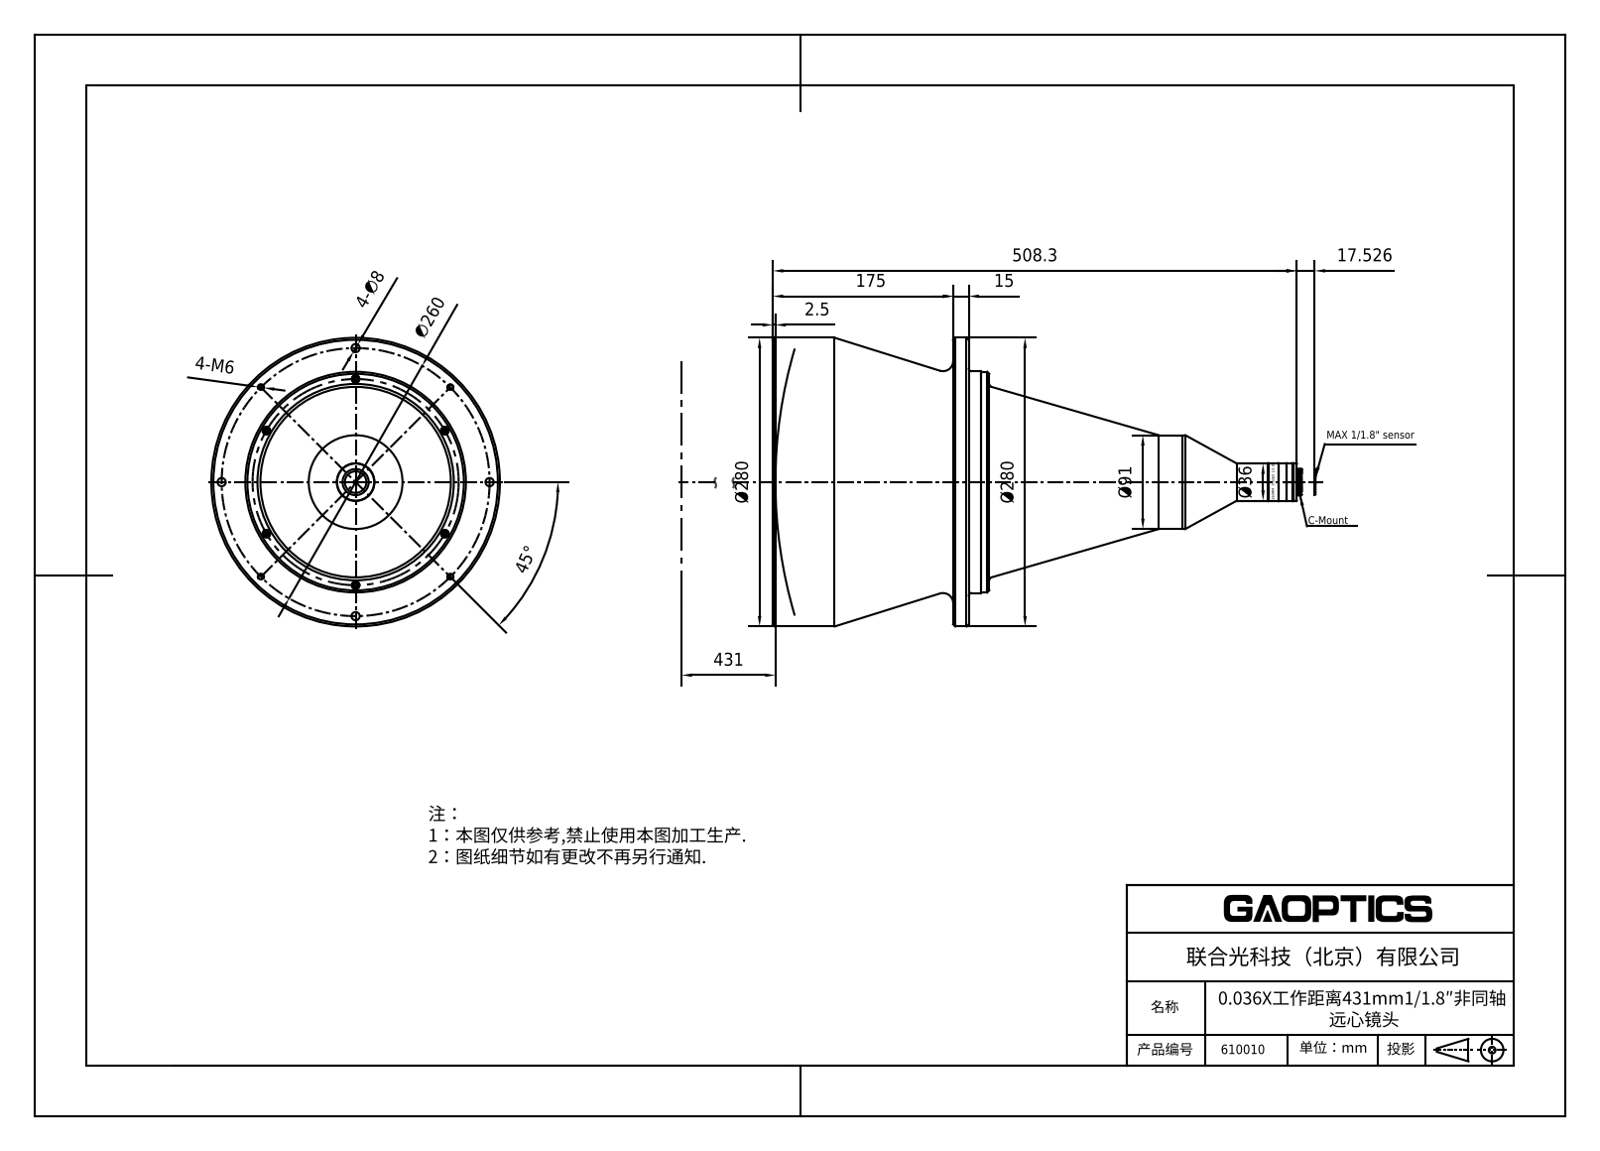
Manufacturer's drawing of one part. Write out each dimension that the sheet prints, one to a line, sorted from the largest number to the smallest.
508.3
431
Ø280
Ø280
∅260
175
Ø91
45°
Ø36
17.526
15
4-∅8
4-M6
2.5
